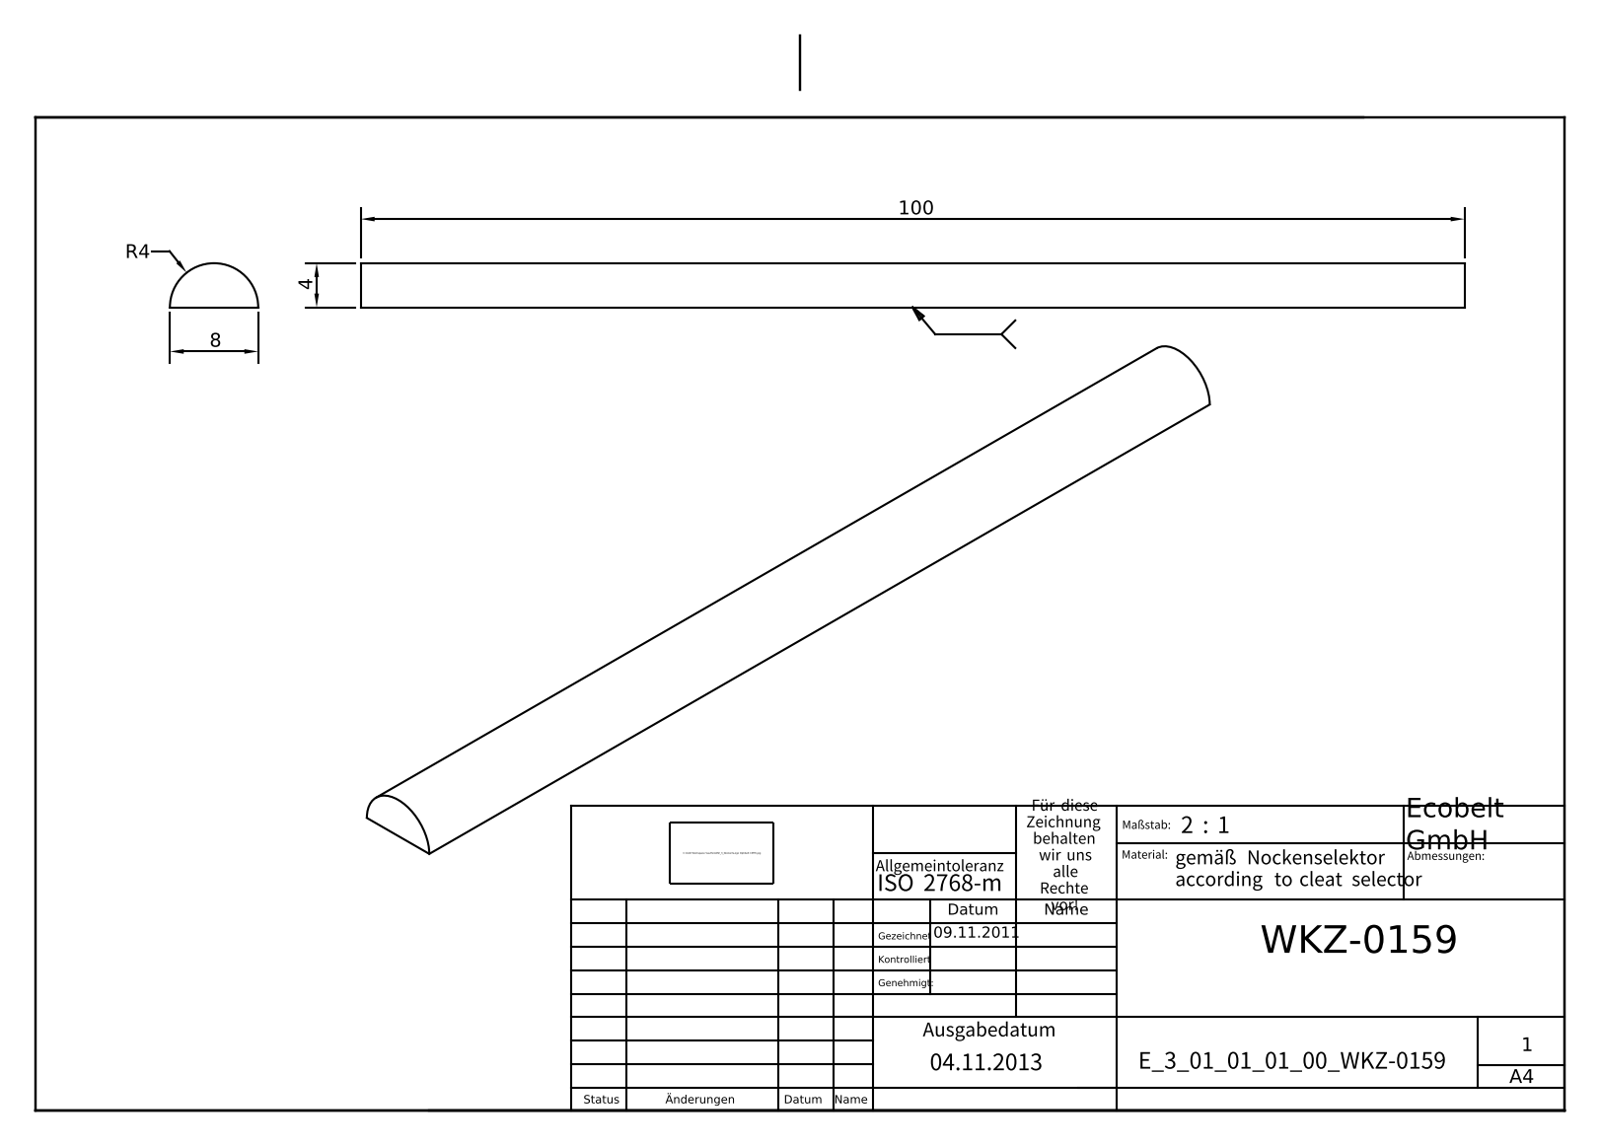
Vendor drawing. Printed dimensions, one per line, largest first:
100
8
4
R4
